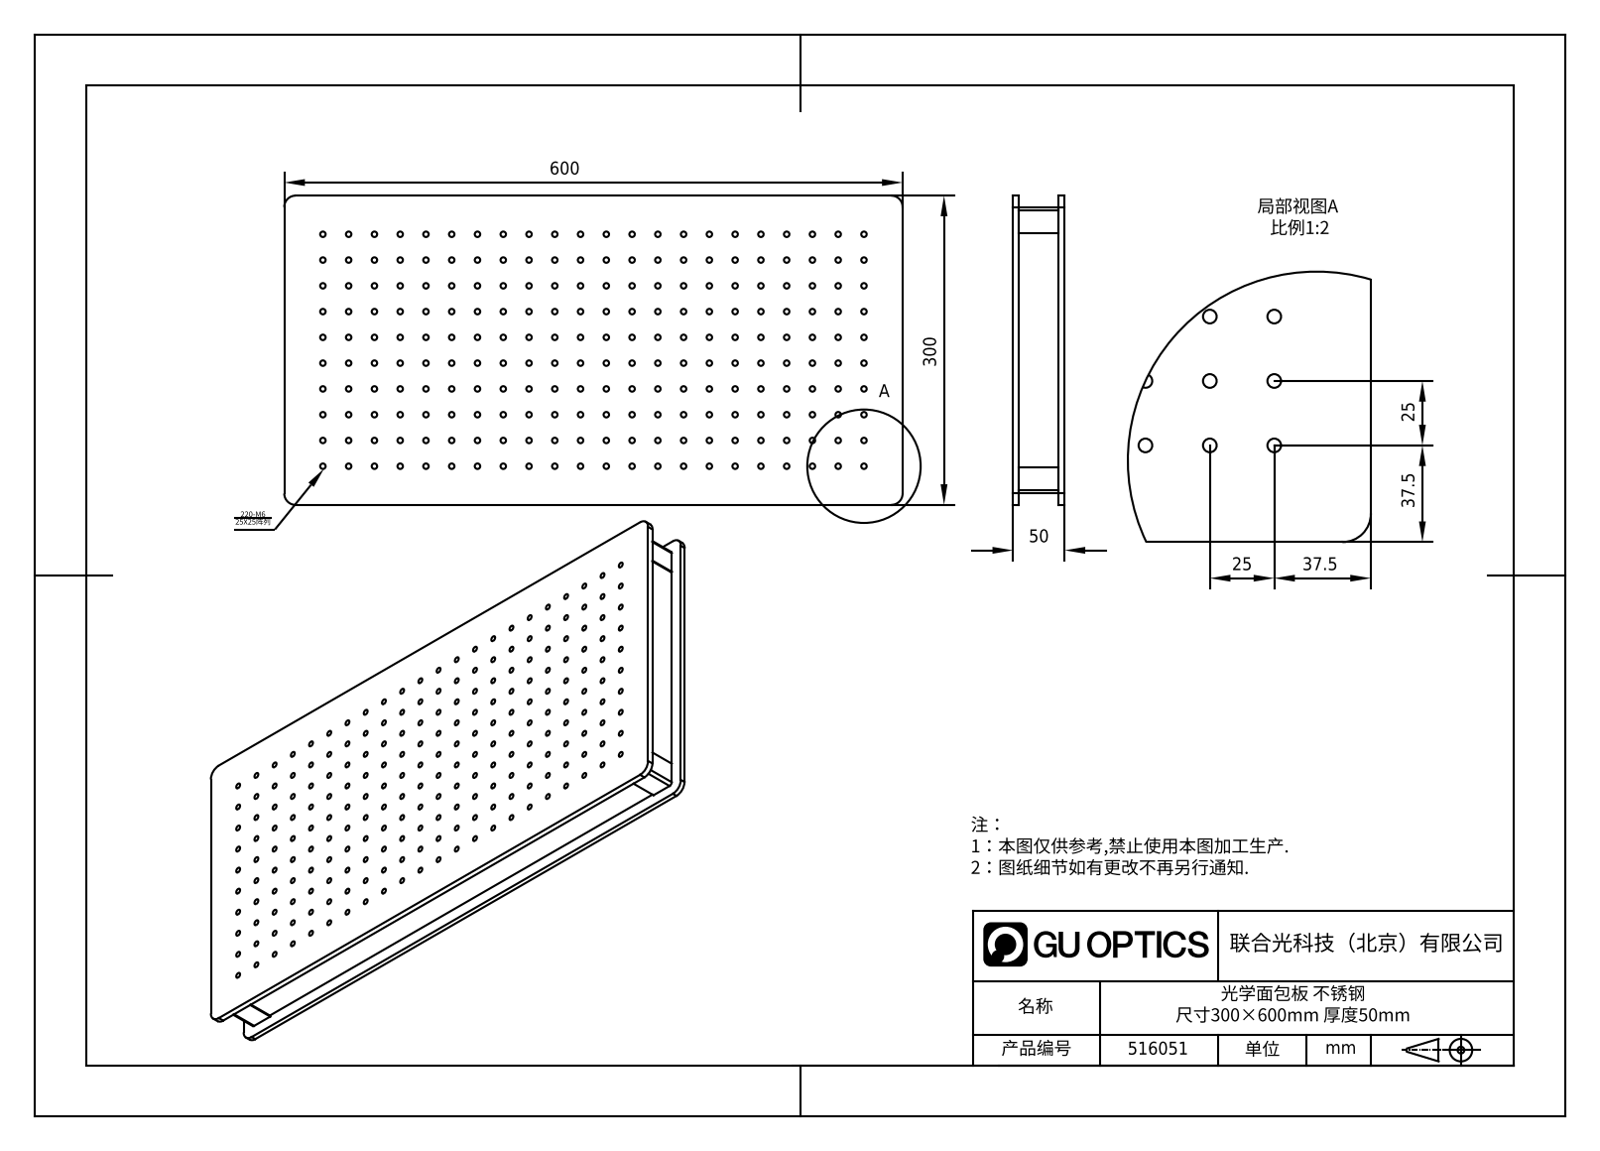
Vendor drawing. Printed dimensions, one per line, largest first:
600
300
50
37.5
37.5
25
25
